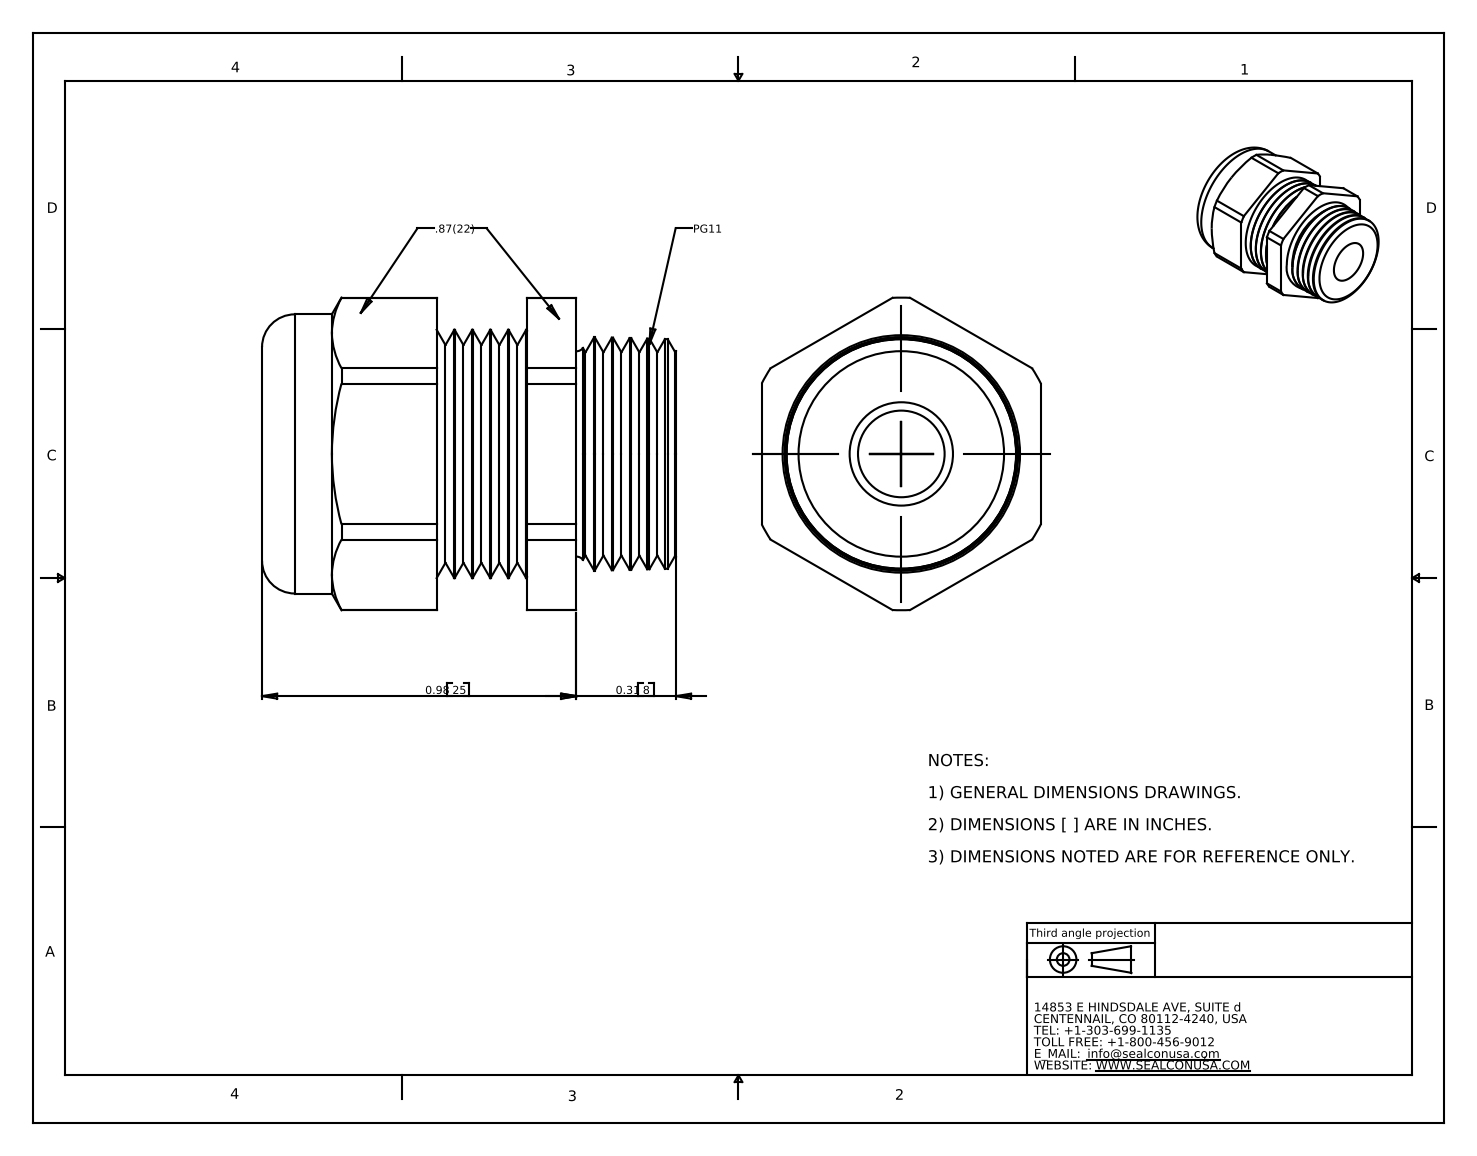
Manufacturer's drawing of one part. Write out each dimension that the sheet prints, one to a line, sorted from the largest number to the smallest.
0.98 25
0.31 8
